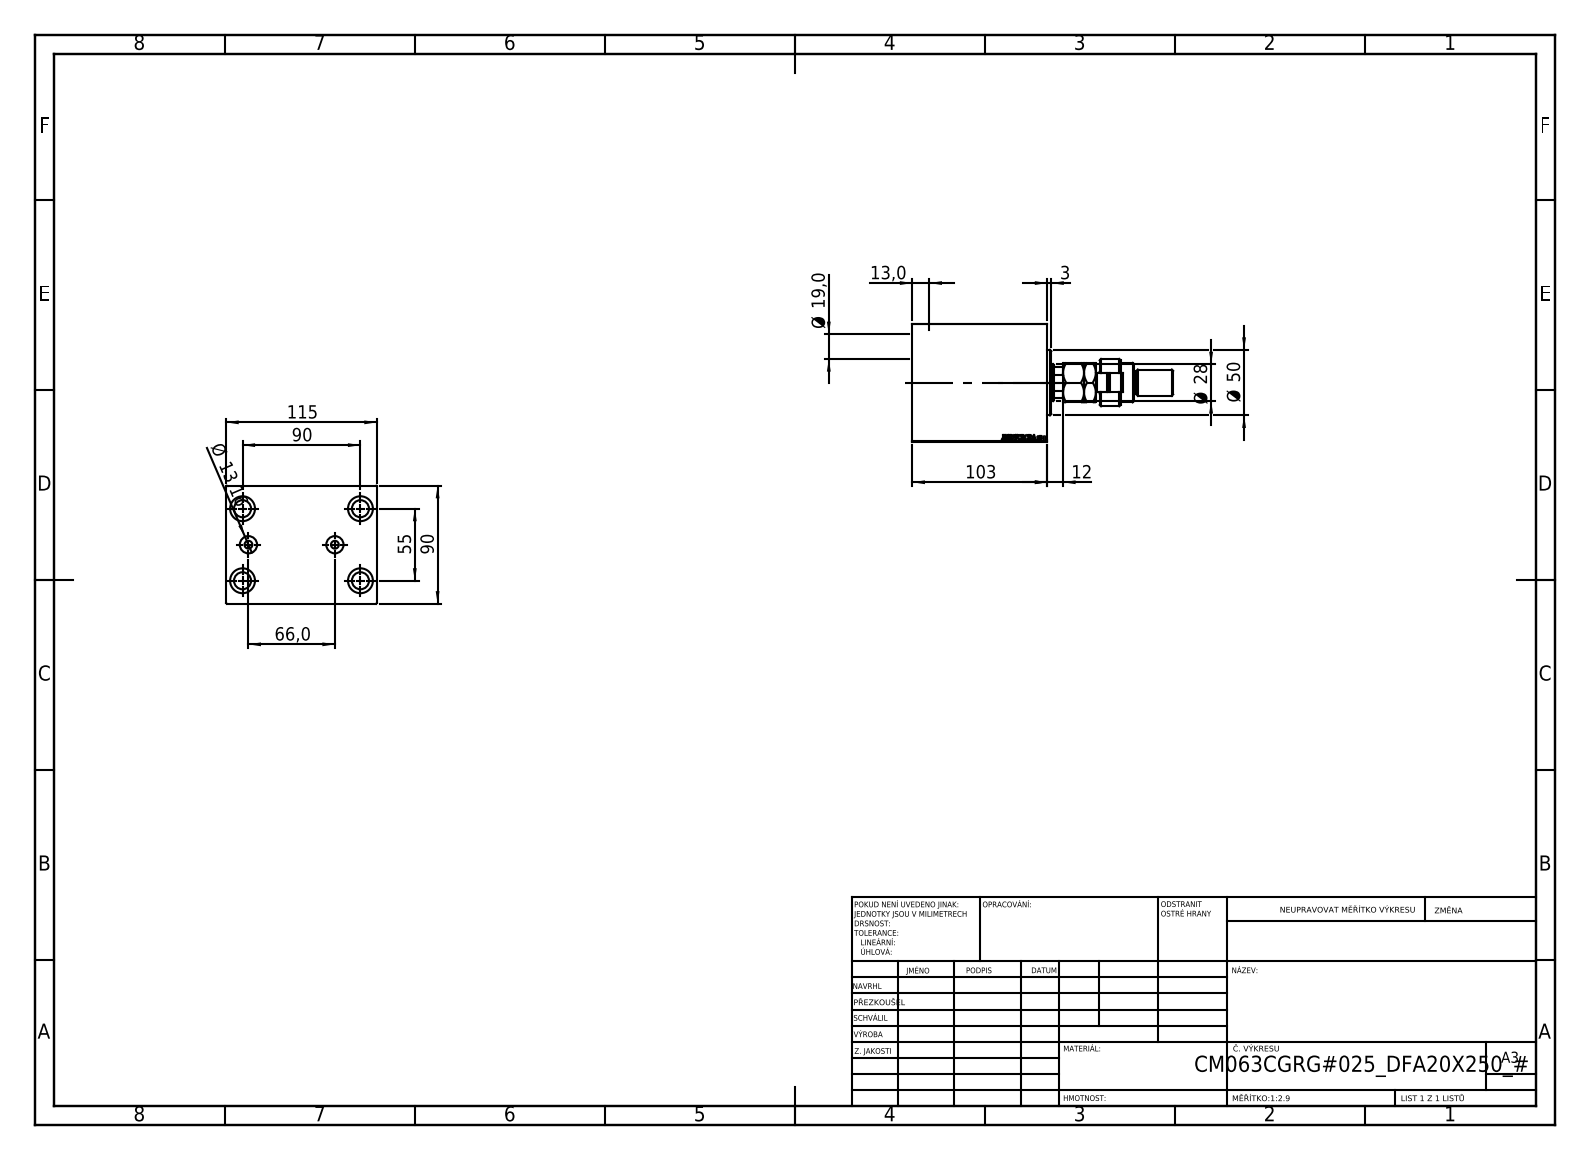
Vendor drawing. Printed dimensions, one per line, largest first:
115
103
90
90
66,0
55
Ø 50
Ø 28
Ø 19,0
Ø 13,16
13,0
12
3
